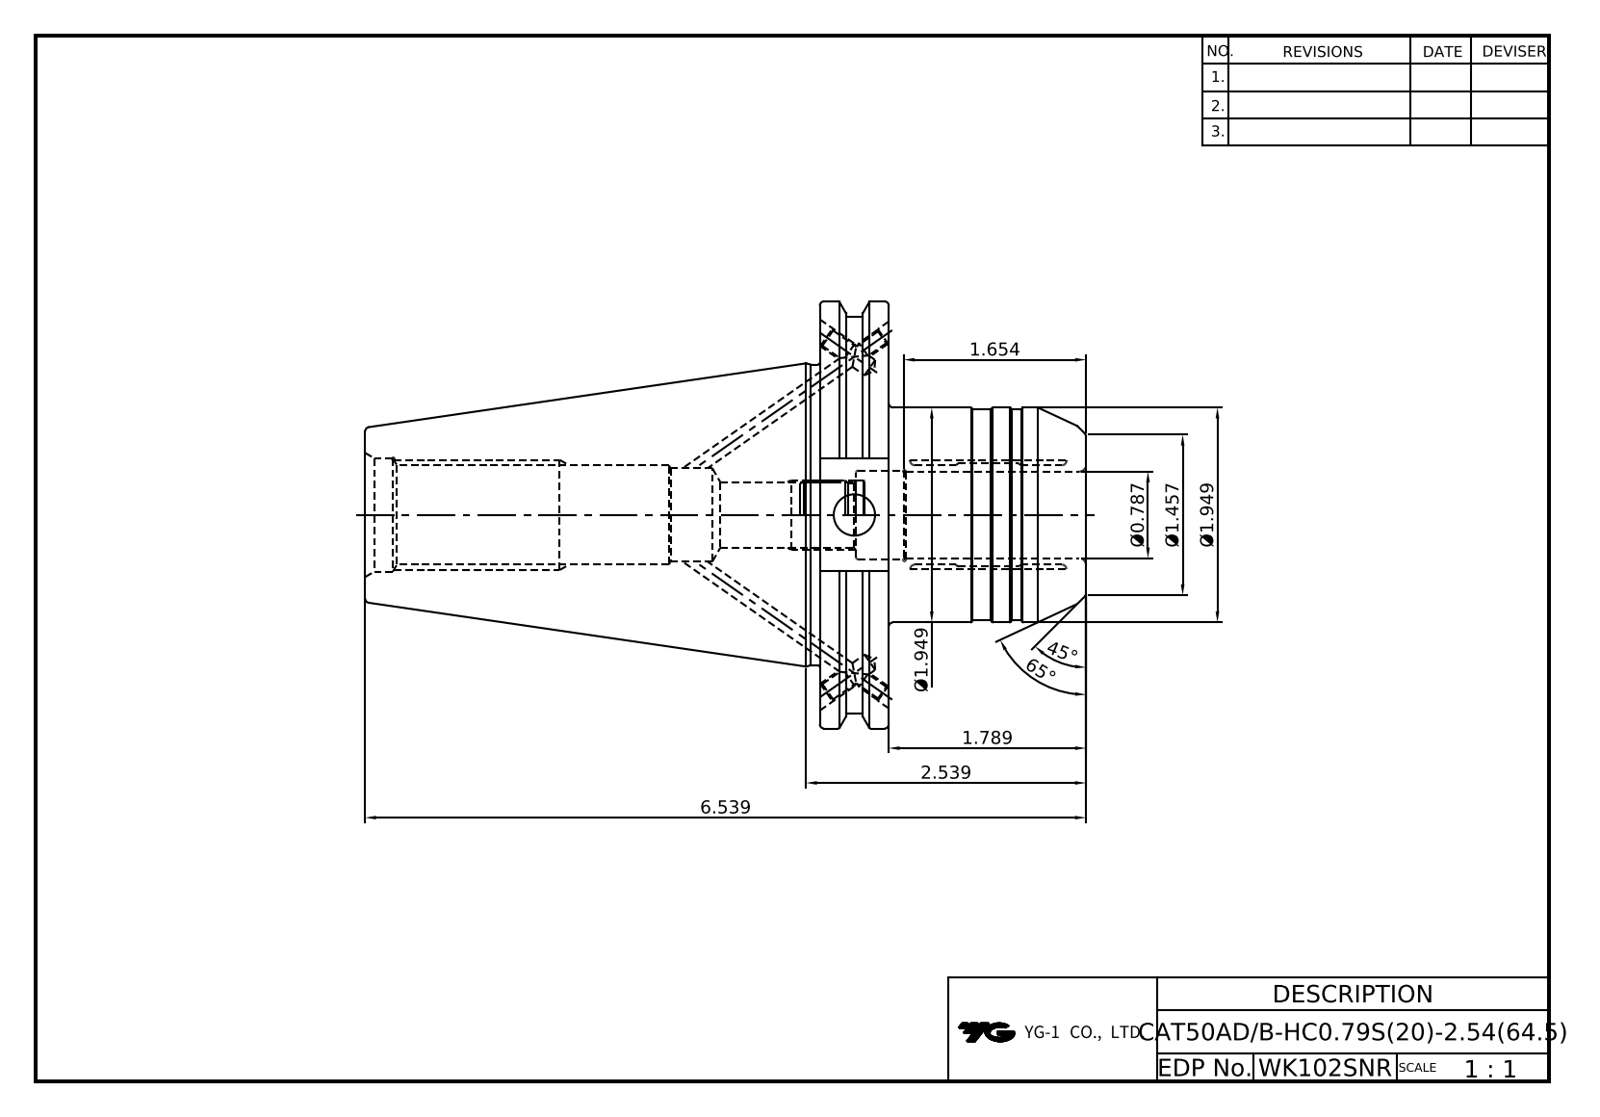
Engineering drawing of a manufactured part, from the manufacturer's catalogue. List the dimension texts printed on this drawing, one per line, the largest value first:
65°
45°
6.539
2.539
Ø1.949
Ø1.949
1.789
1.654
Ø1.457
Ø0.787
